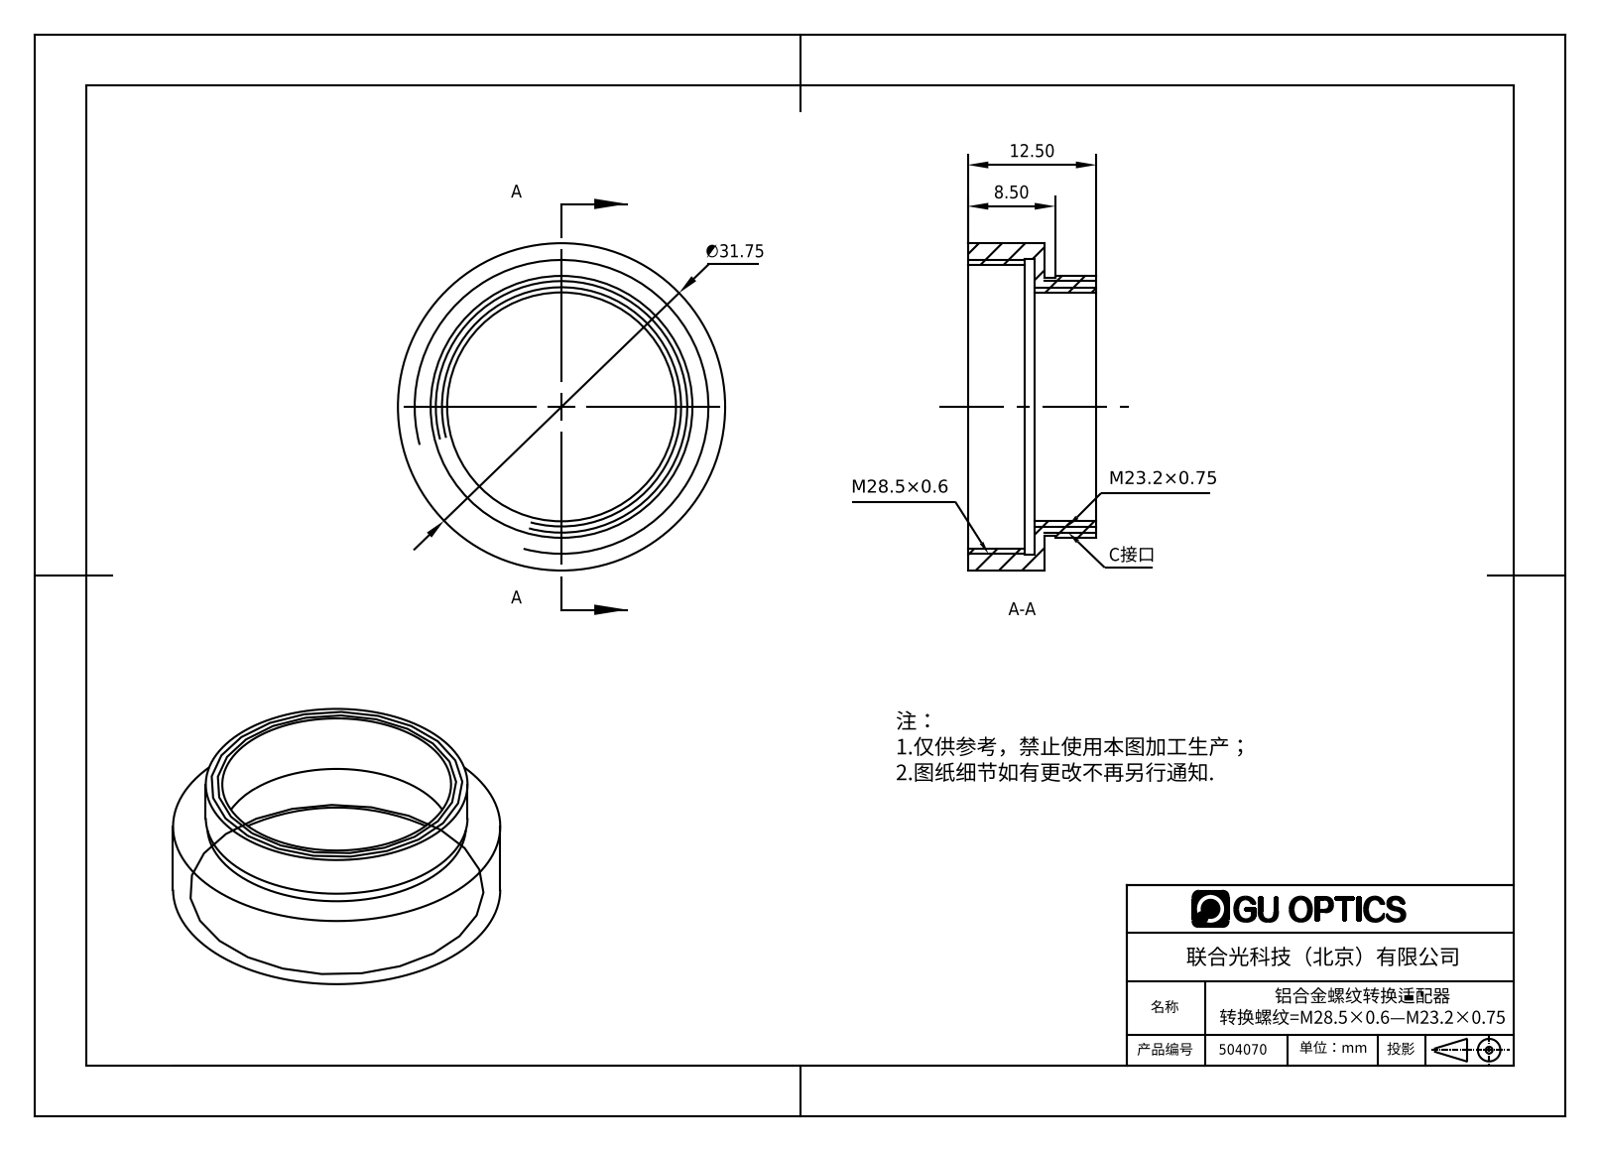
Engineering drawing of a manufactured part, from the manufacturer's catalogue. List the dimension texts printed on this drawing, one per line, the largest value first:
∅31.75
12.50
8.50
